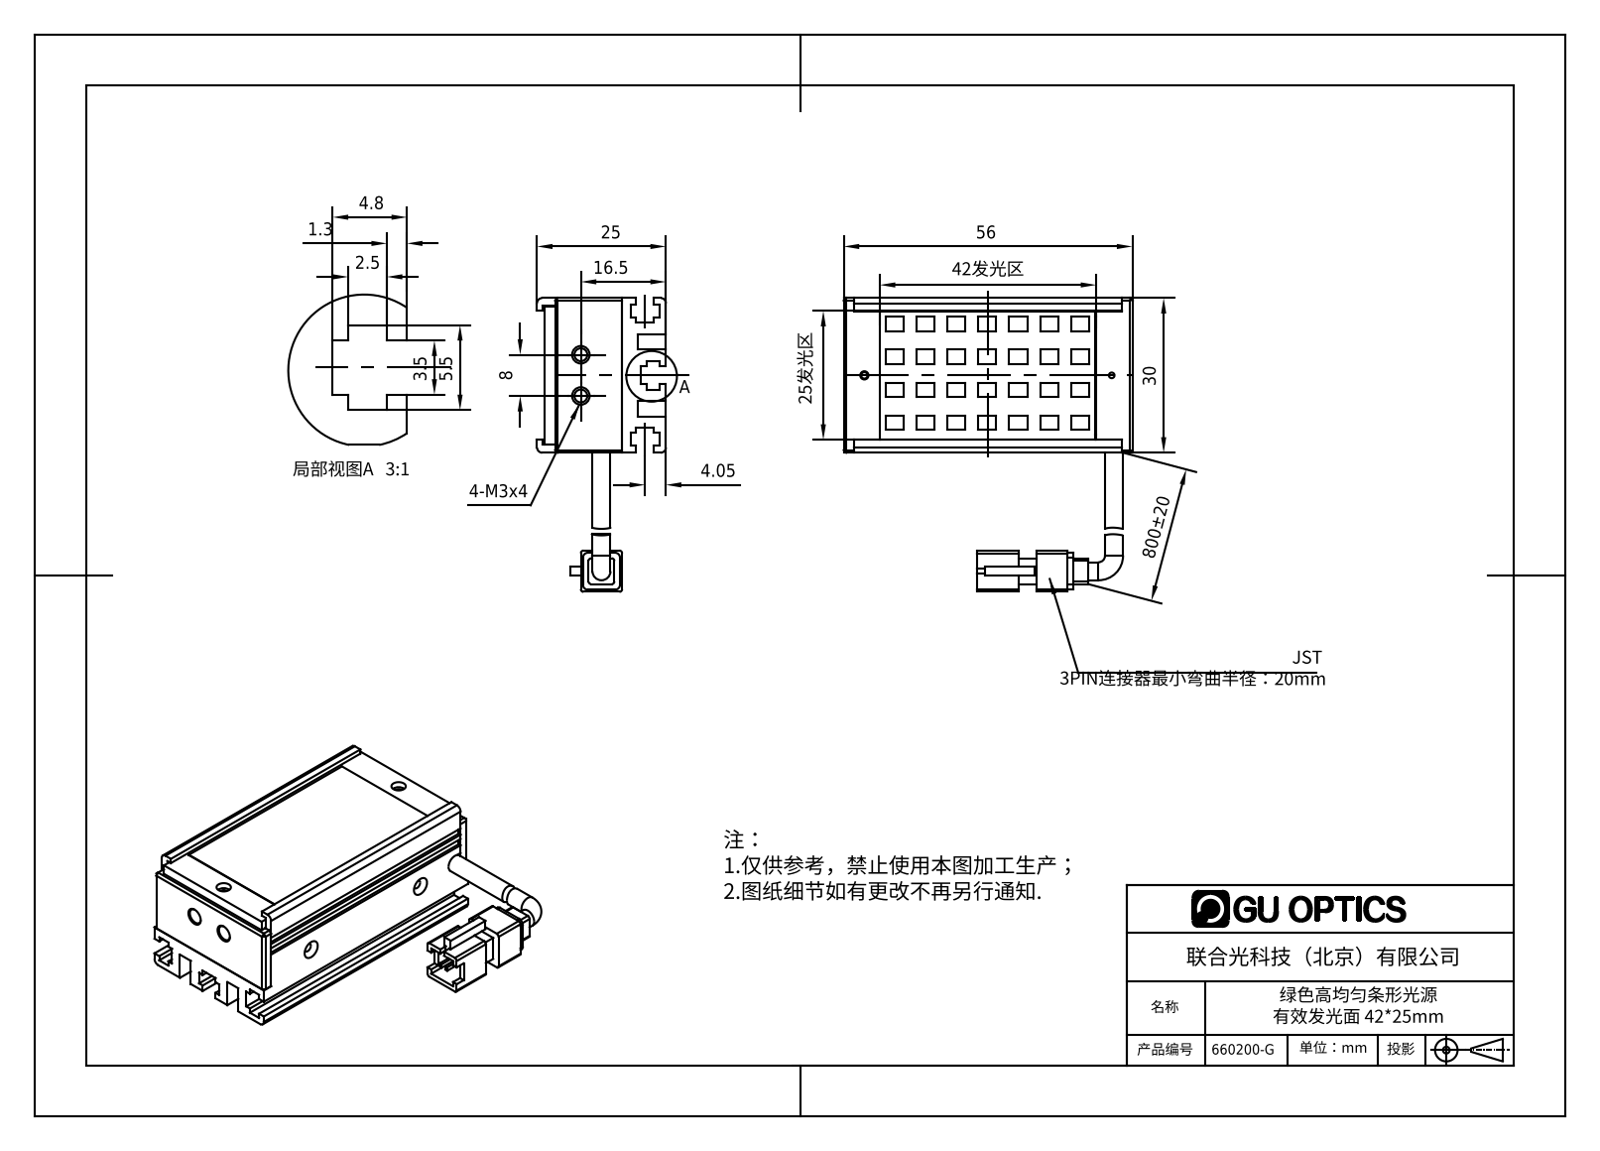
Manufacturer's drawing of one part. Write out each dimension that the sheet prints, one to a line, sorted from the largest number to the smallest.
800±20
56
42发光区
30
25发光区
25
16.5
8
5.5
4.8
4.05
3.5
2.5
1.3
